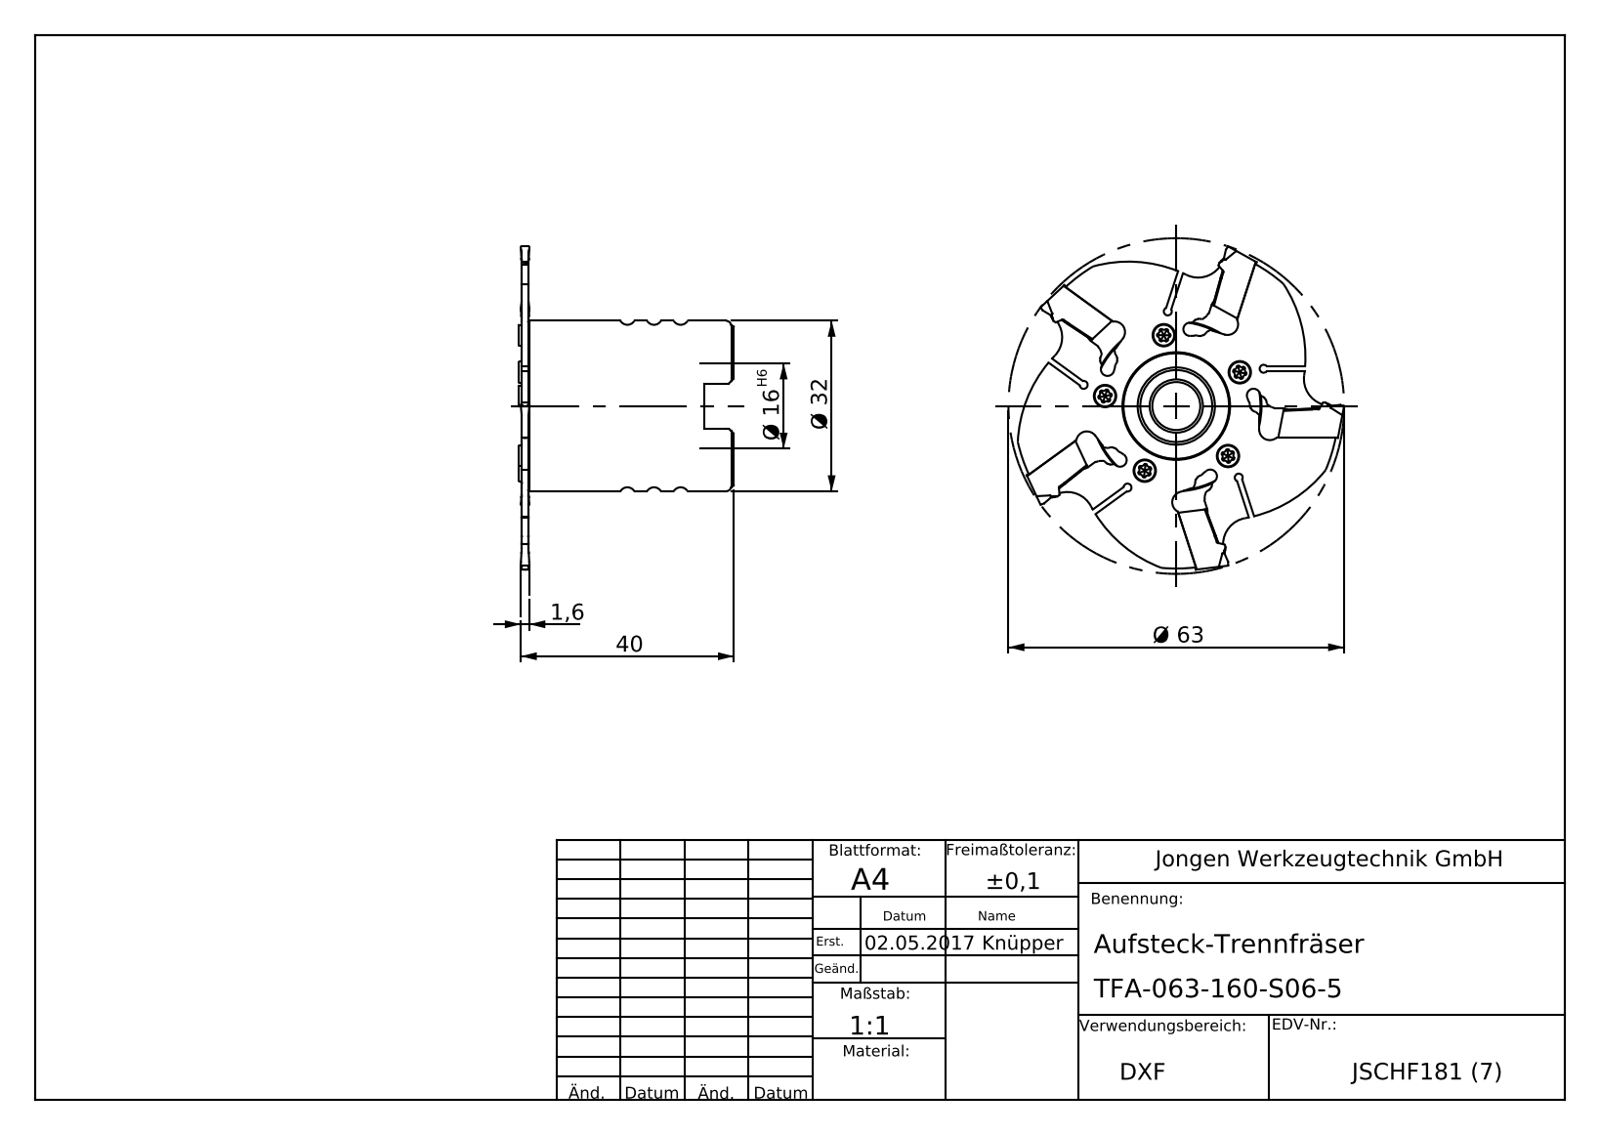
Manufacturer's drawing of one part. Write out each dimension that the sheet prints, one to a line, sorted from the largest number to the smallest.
Ø 63
40
Ø 32
Ø 16 H6
1,6
